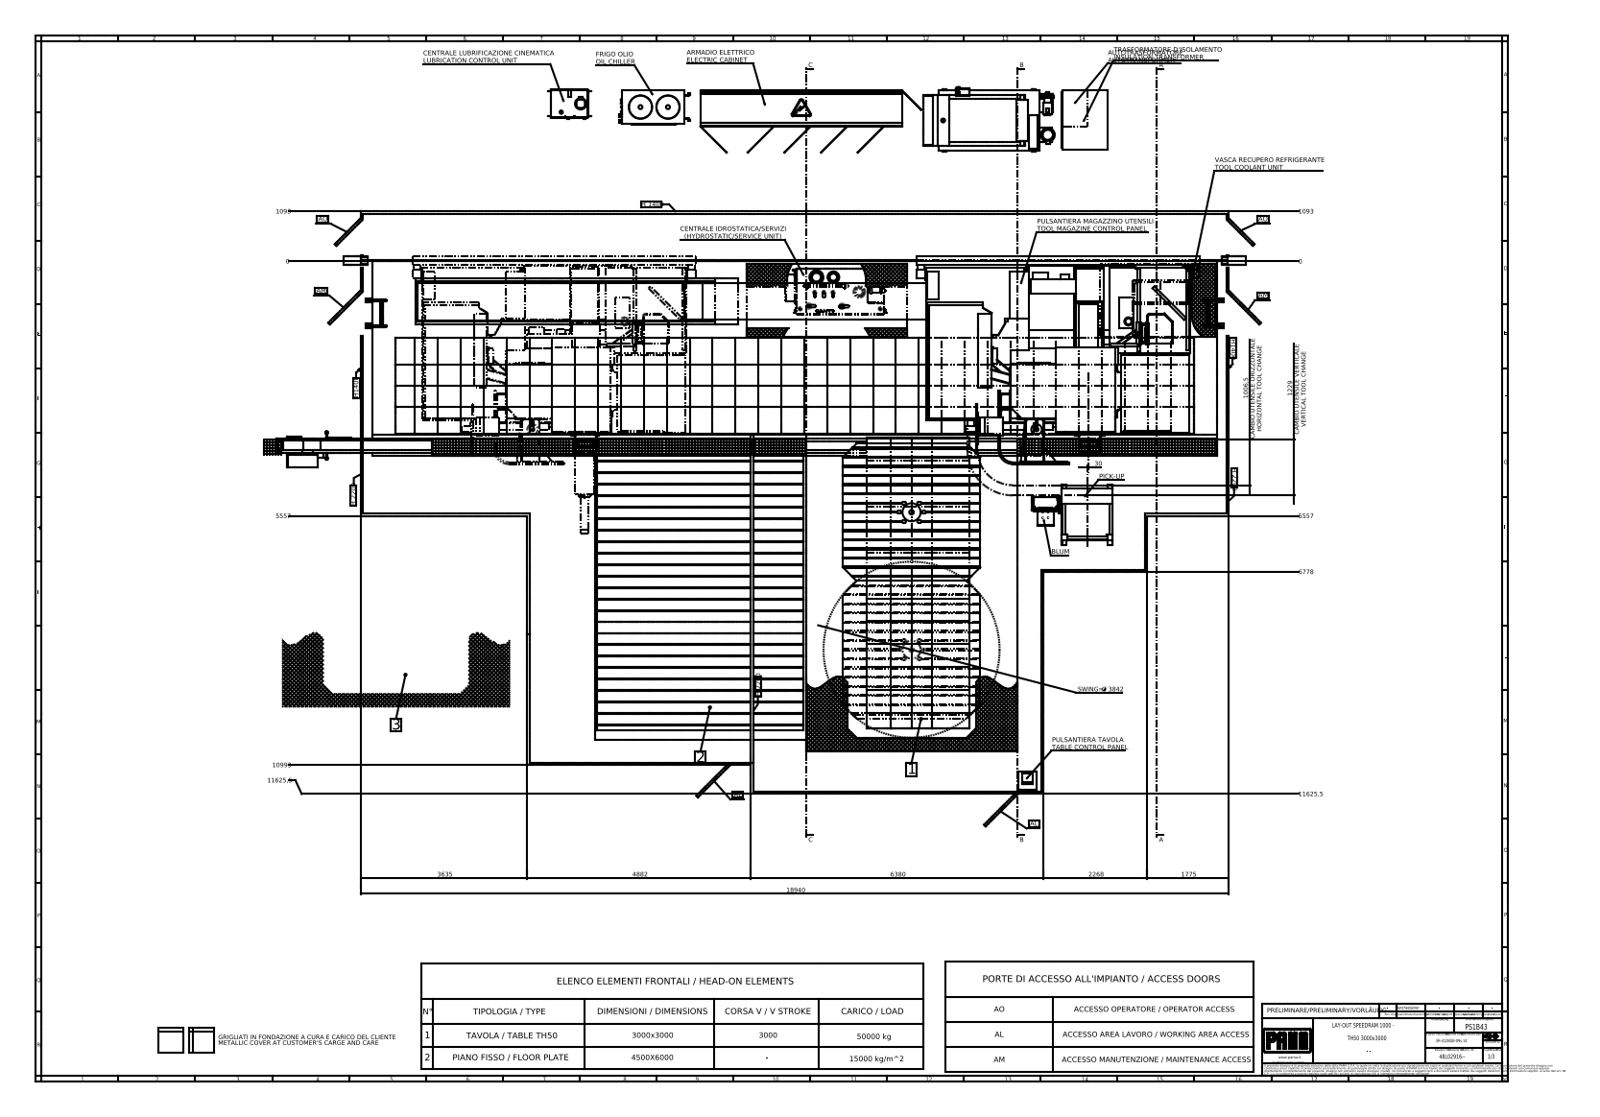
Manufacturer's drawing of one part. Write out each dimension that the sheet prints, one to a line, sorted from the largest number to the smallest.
18940
11625,5
11625,5
10993
6778
6380
5557
5557
4882
SWING= Ø 3842
3635
2268
1775
1229 CAMBIO UTENSILE VERTICALE VERTICAL TOOL CHANGE
1093
1093
1006,5 CAMBIO UTENSILE ORIZZONTALE HORIZONTAL TOOL CHANGE
30
0
0
